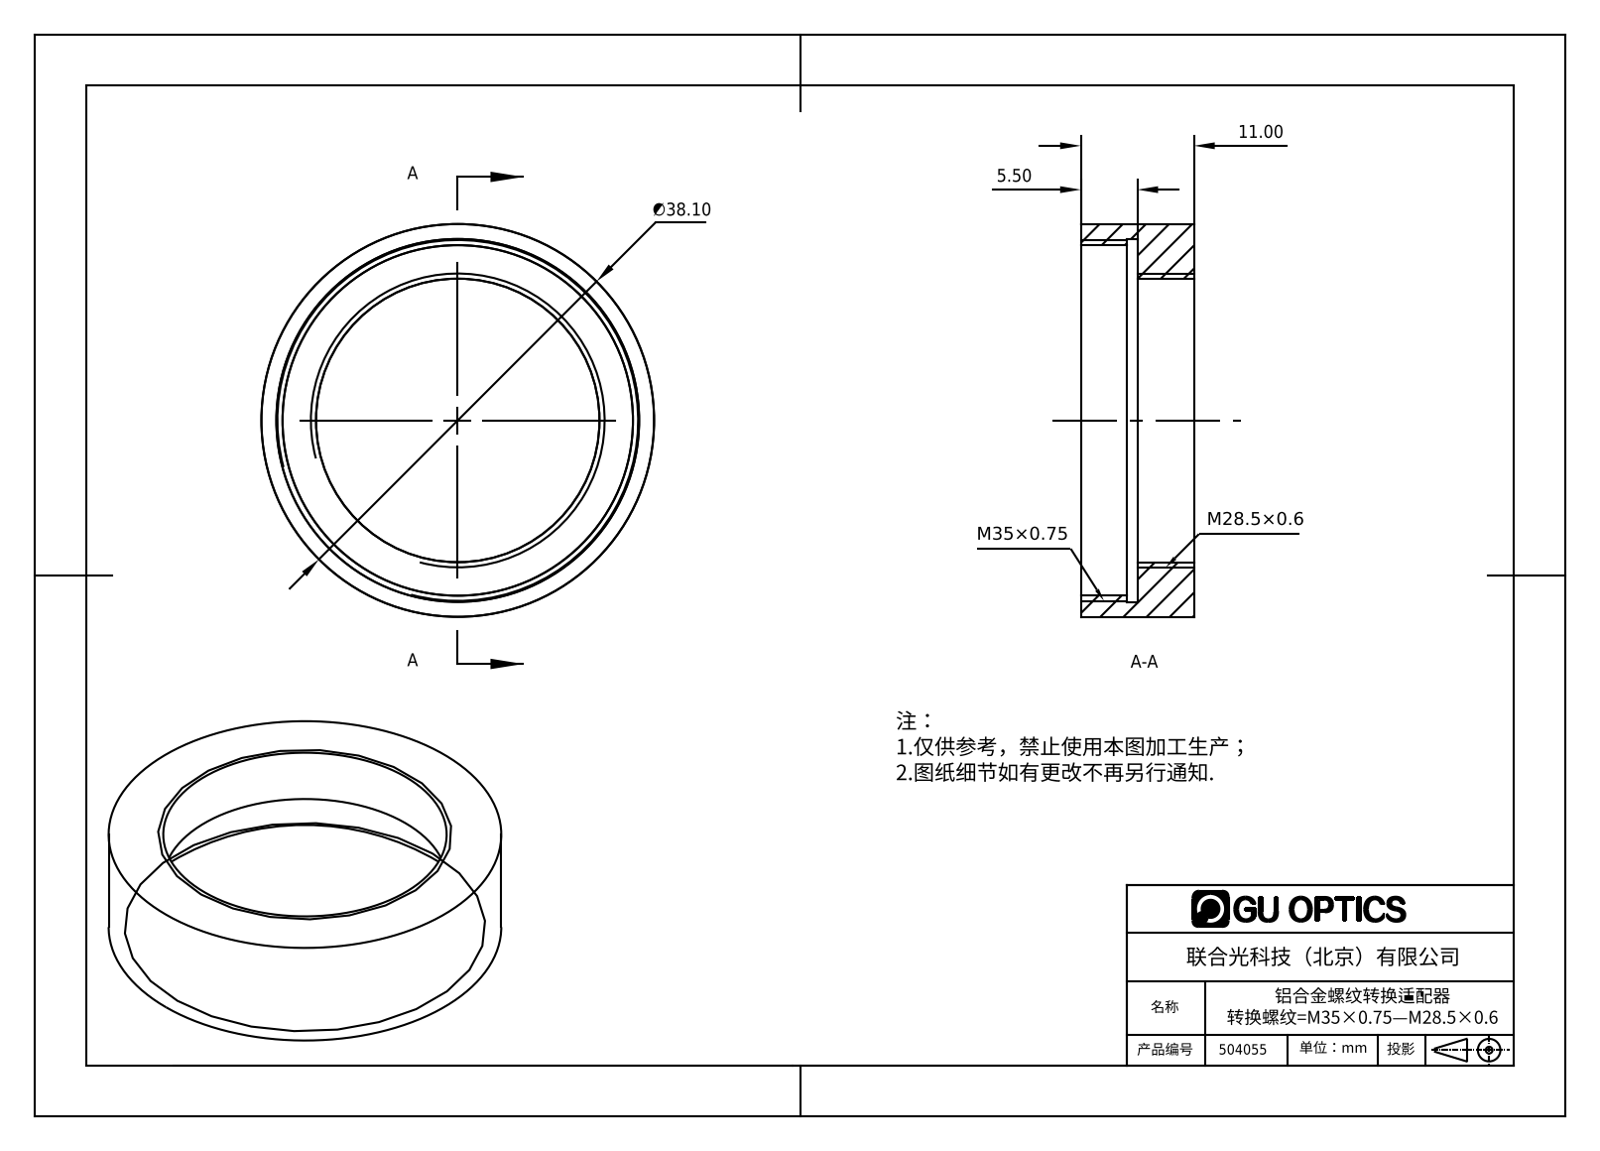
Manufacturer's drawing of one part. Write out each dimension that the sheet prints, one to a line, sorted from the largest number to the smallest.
∅38.10
11.00
5.50
